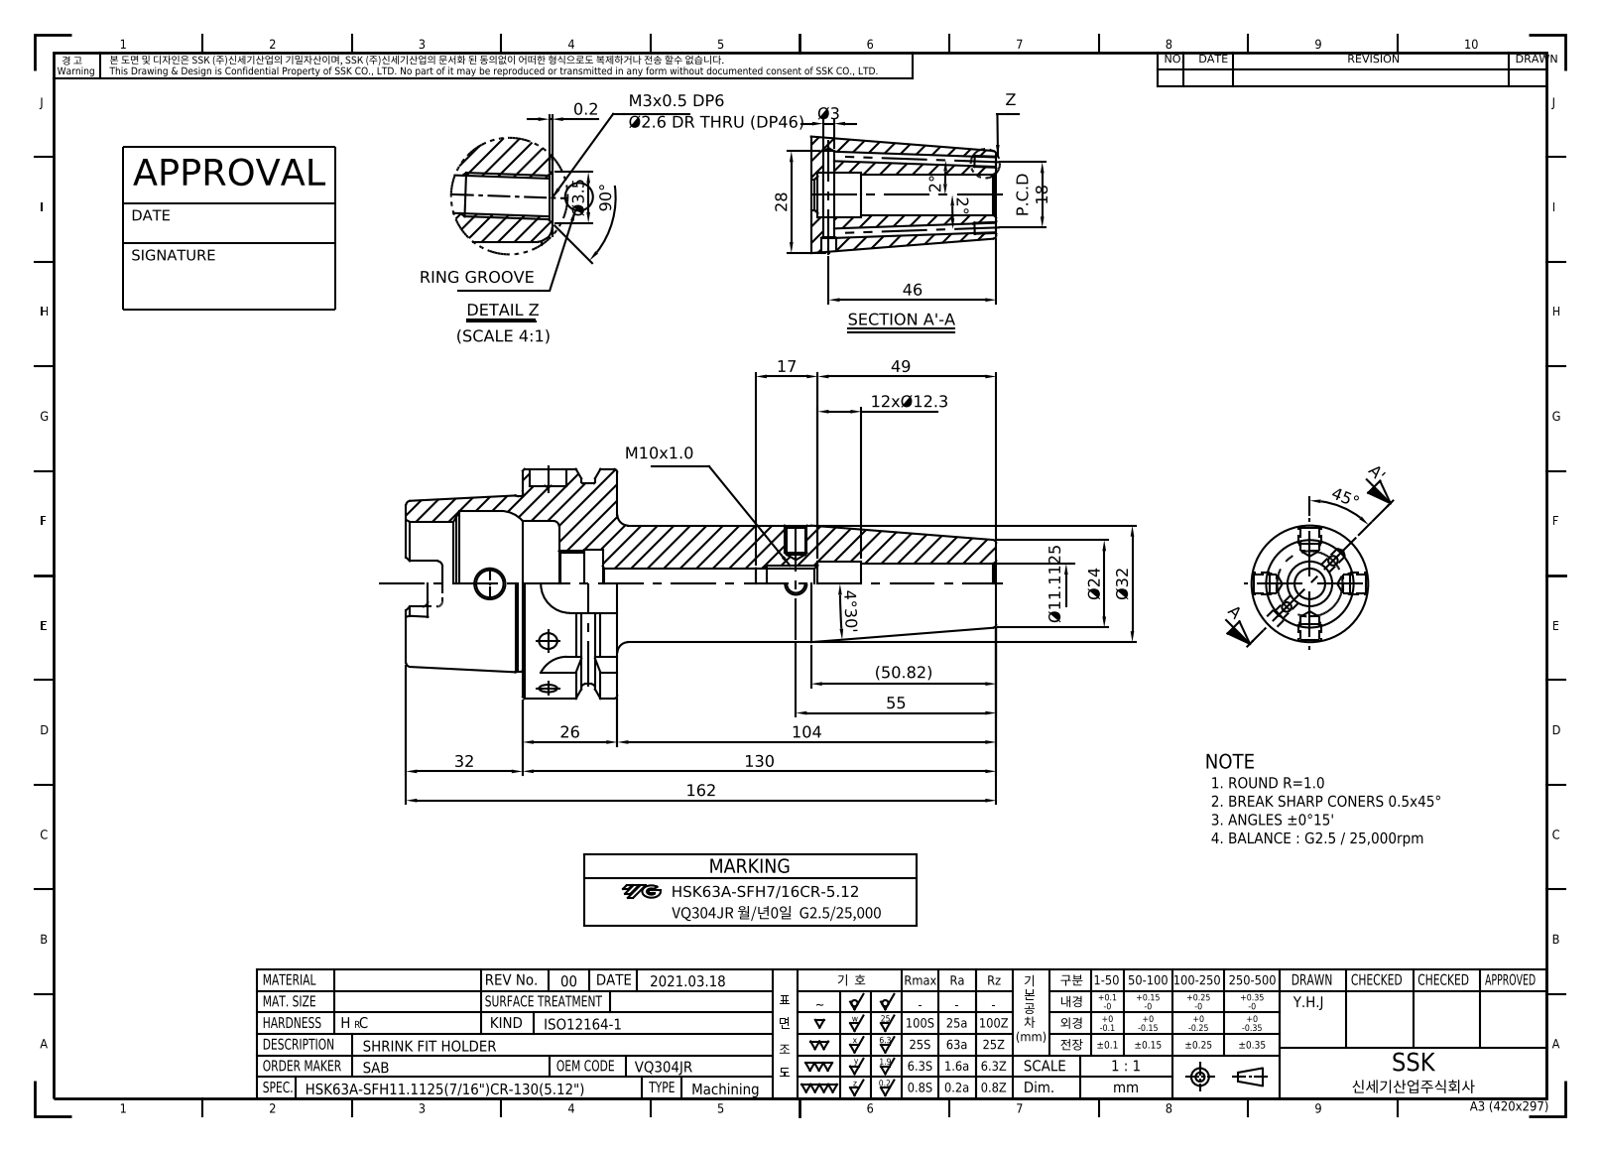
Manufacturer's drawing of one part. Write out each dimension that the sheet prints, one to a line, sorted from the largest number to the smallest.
162
130
104
90°
55
(50.82)
49
46
45°
Ø32
32
28
26
Ø24
P.C.D 18
17
12xØ12.3
Ø11.1125
4°30'
Ø3.5
Ø3
2°
2°
0.2
